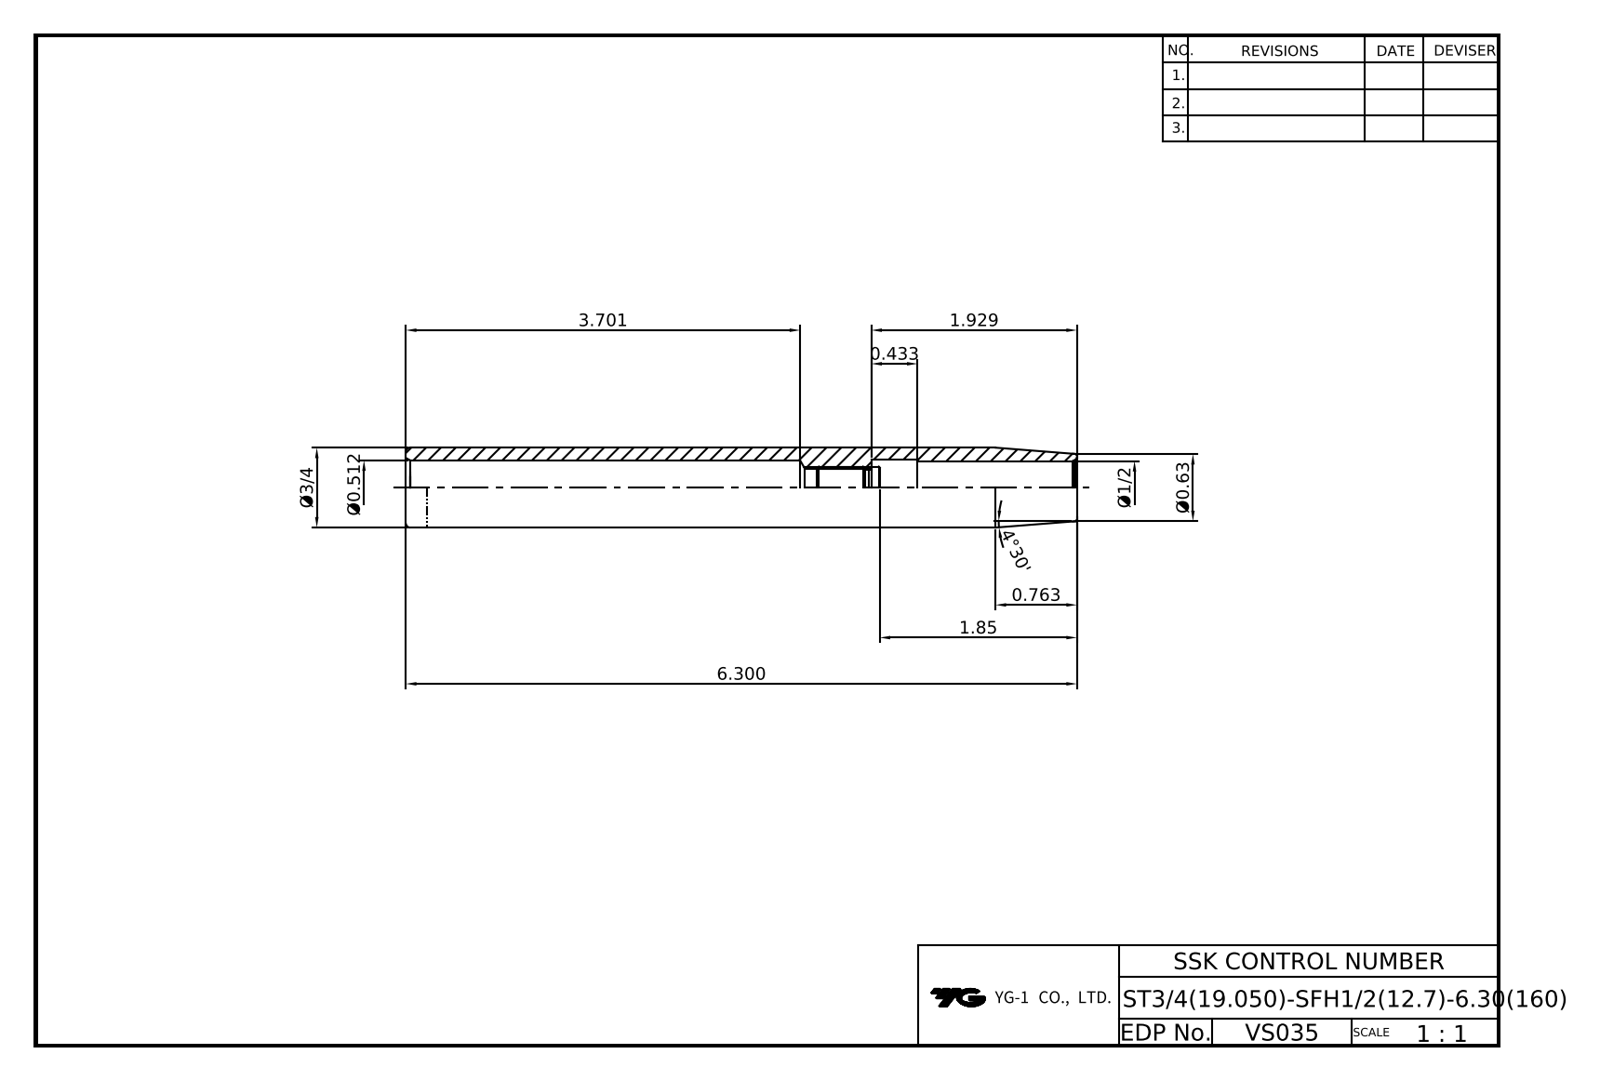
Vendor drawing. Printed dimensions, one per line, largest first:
6.300
4°30'
3.701
1.929
1.85
0.763
Ø3/4
Ø0.63
0.433
